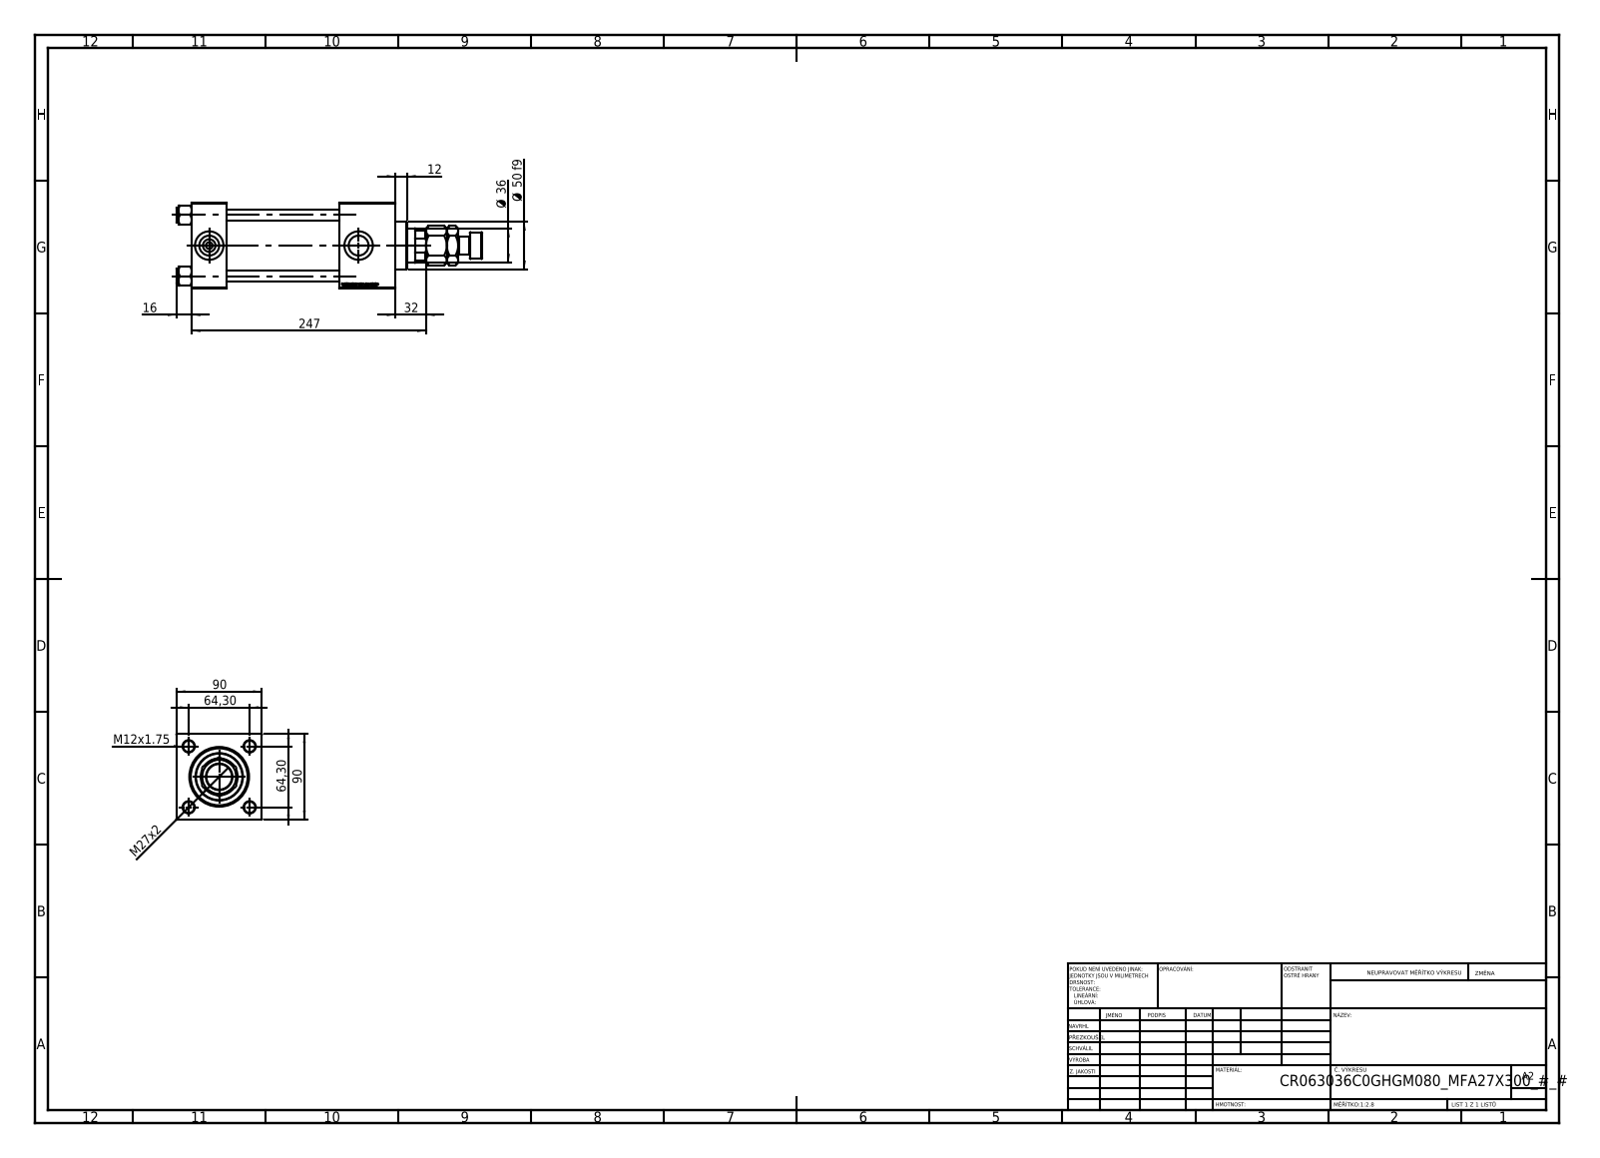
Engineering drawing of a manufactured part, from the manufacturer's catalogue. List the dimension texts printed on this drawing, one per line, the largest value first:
247
90
90
64,30
64,30
Ø 50 f9
Ø 36
32
M27x2
16
12
M12x1.75
